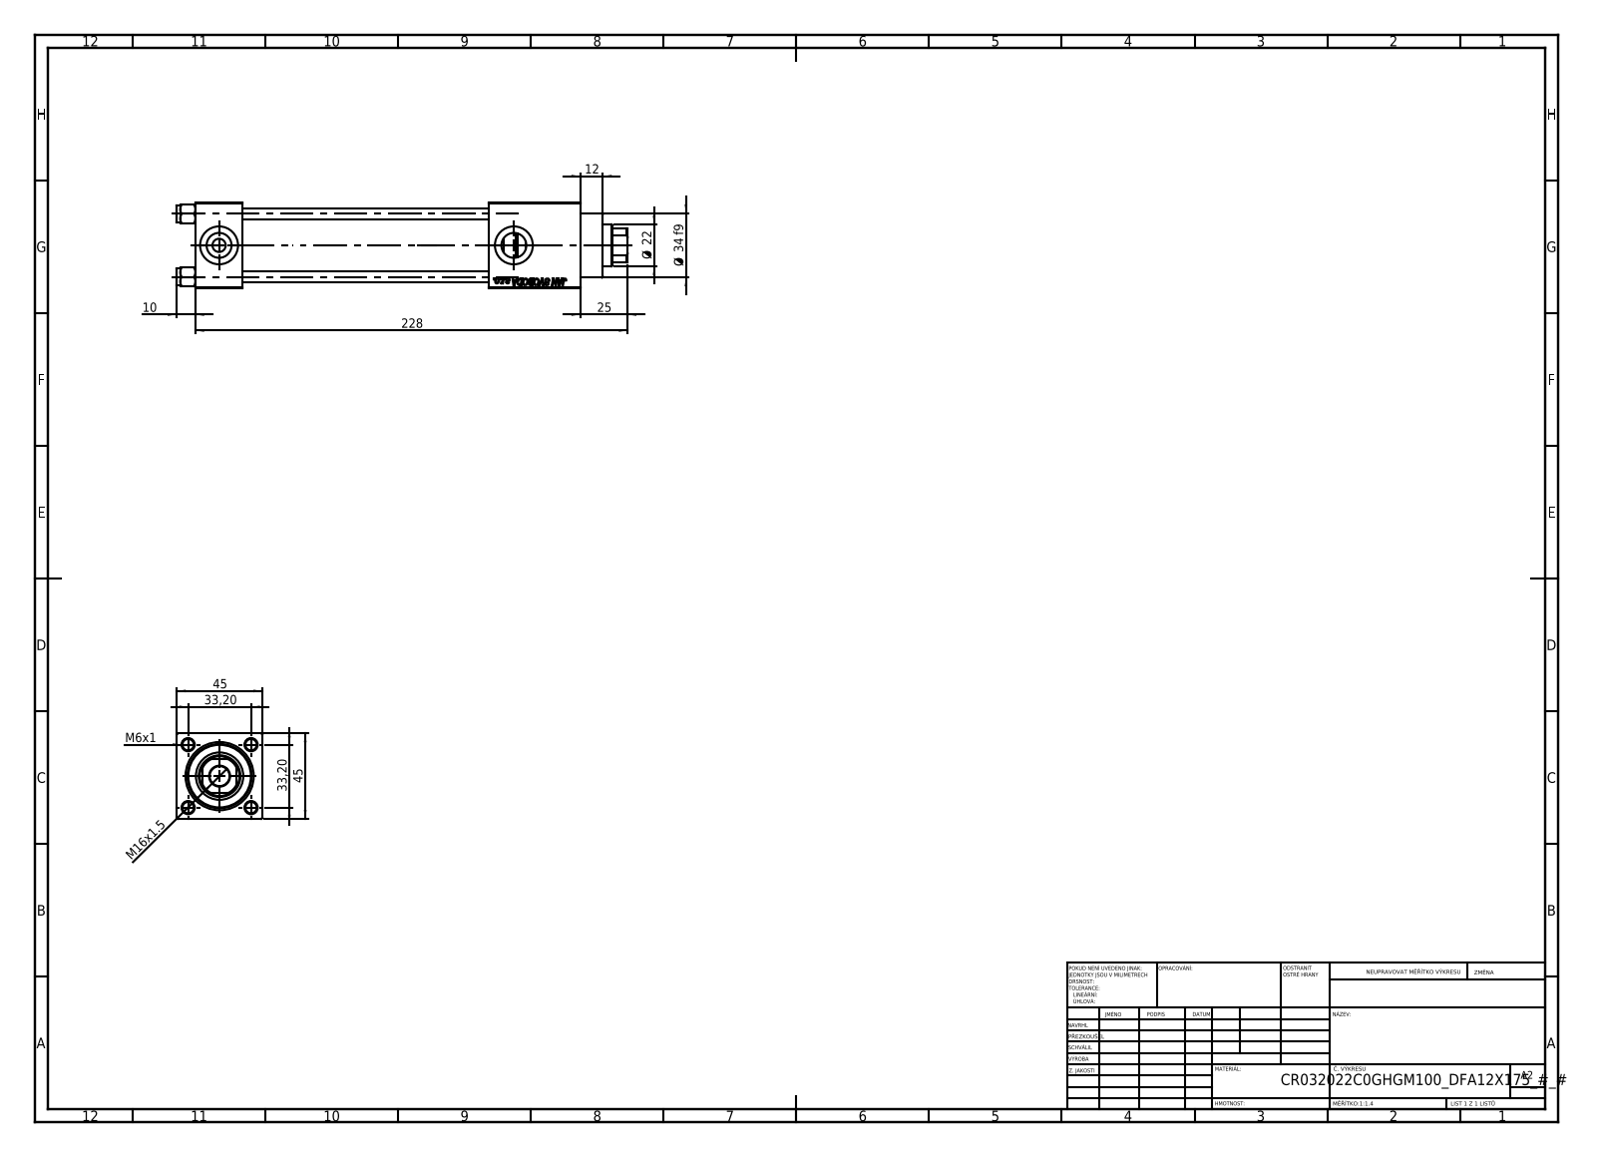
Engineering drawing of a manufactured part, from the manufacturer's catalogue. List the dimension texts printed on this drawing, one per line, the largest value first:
228
45
45
Ø 34 f9
33,20
33,20
25
Ø 22
M16x1.5
12
10
M6x1
